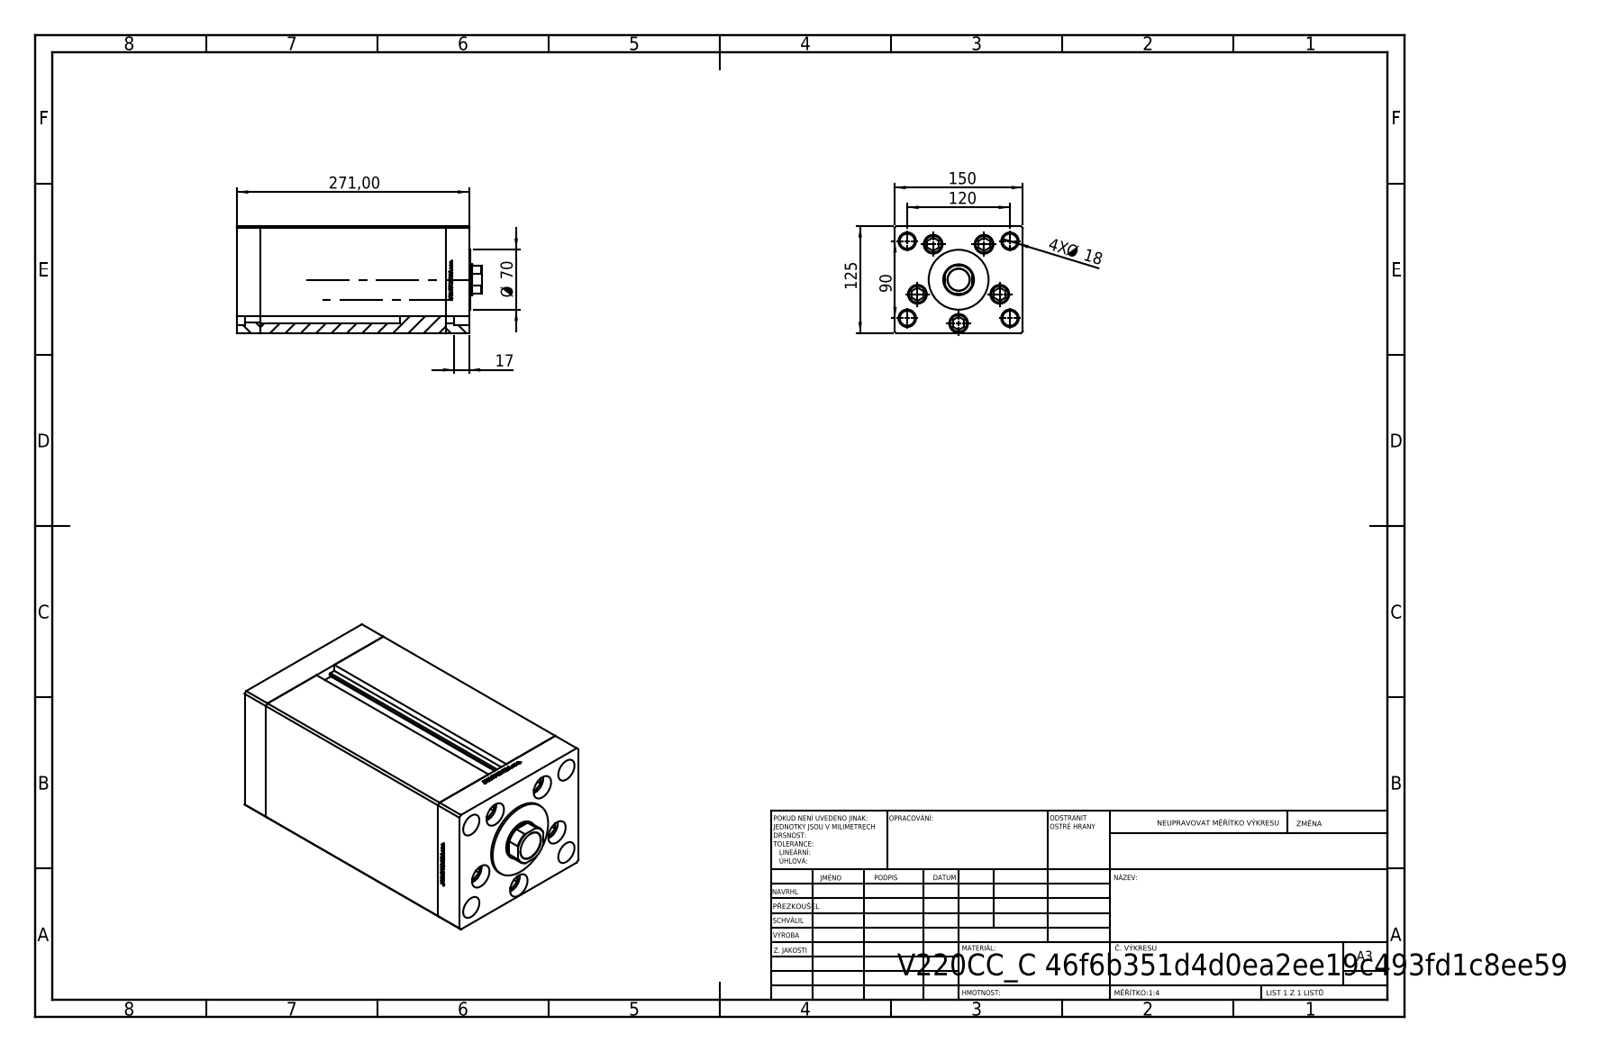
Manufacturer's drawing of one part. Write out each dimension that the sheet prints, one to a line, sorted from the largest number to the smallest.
271,00
150
125
120
90
Ø 70
4X Ø 18
17
